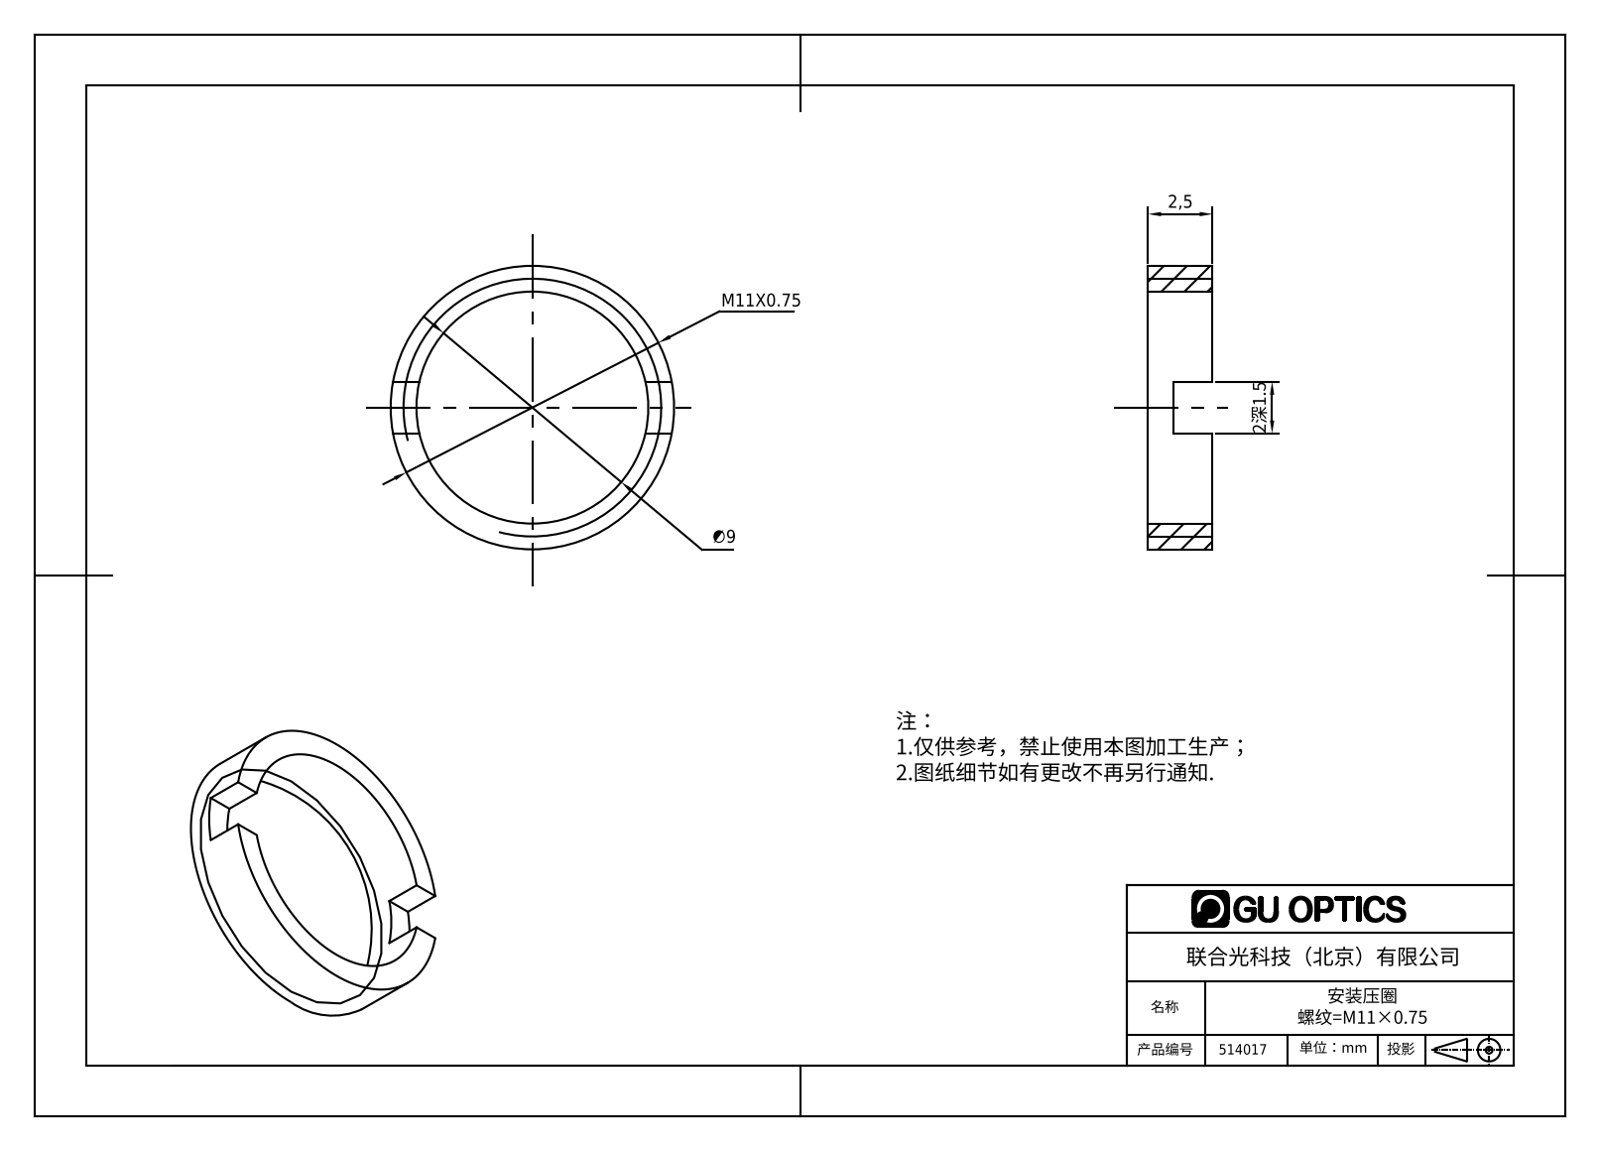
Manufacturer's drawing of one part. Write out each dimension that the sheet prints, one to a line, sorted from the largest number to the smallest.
M11X0.75
∅9
2,5
2深1.5
